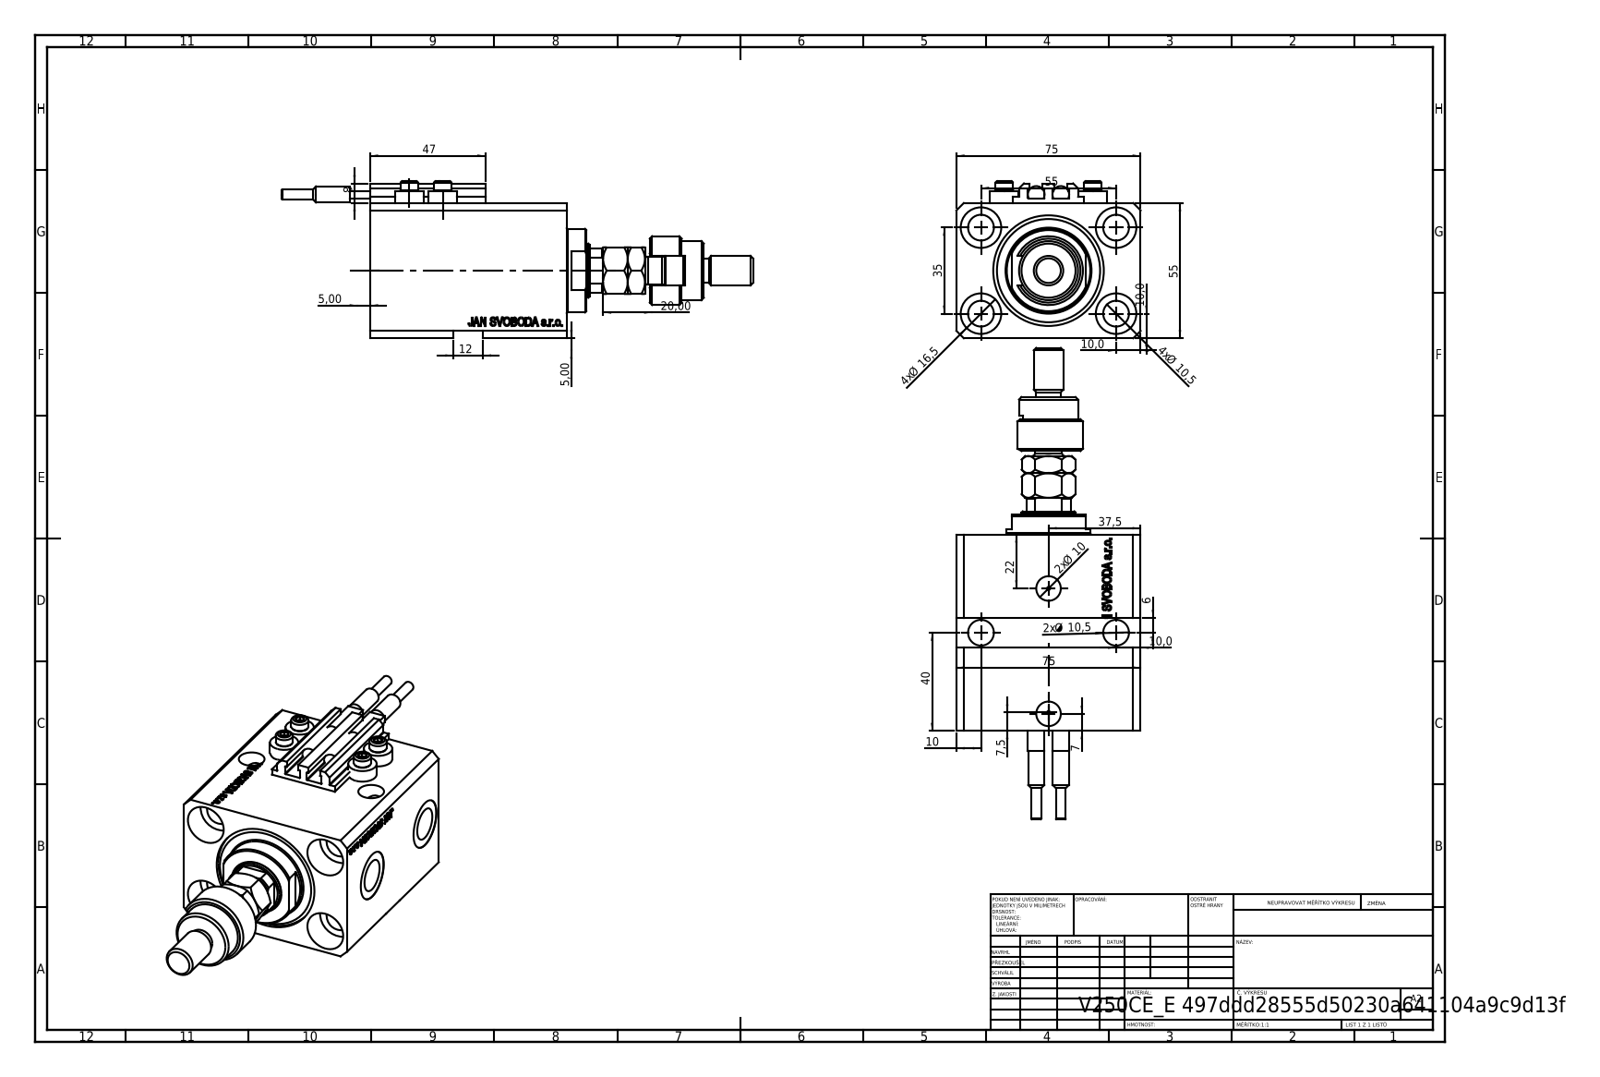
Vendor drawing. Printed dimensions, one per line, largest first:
75
75
55
55
47
40
37,5
35
22
20,00
4x Ø 16,5
12
4x Ø 10,5
2x Ø 10,5
10,0
10,0
2x Ø 10
10,0
10
8
7,5
7
6
5,00
5,00
